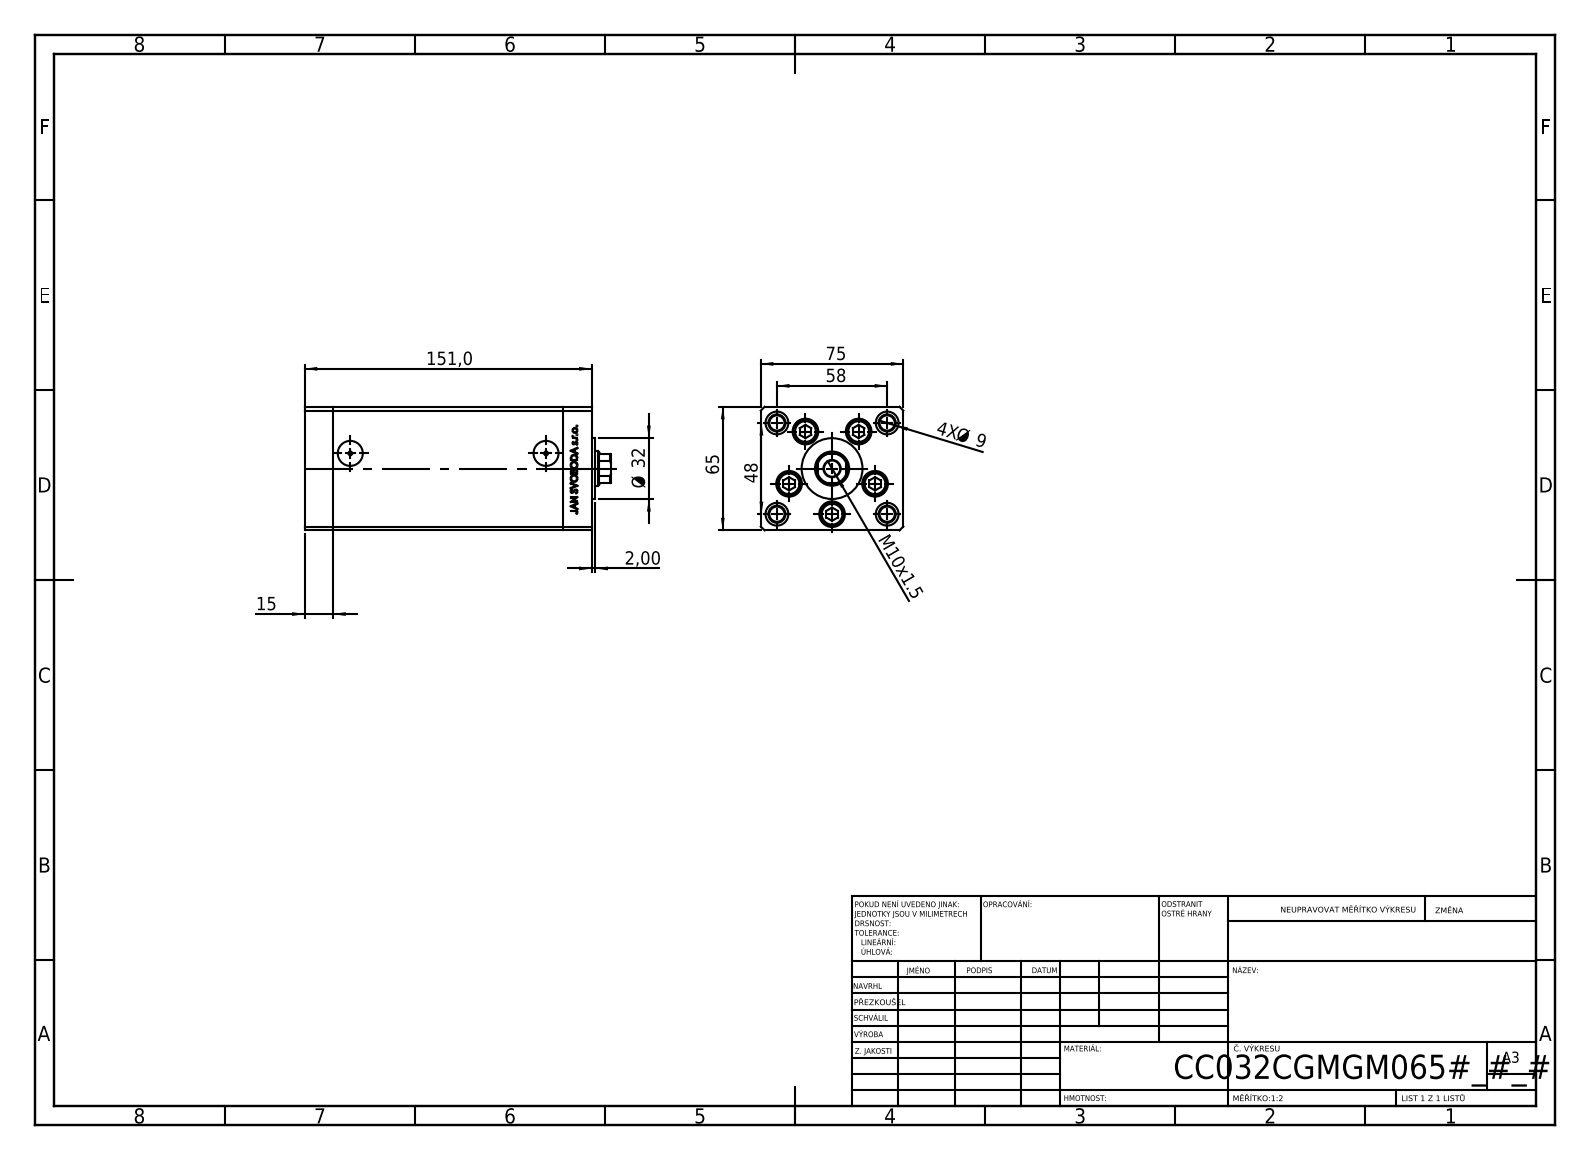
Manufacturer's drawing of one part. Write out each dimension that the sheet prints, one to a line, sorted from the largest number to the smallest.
151,0
75
65
58
48
Ø 32
15
M10x1.5
4X Ø 9
2,00
